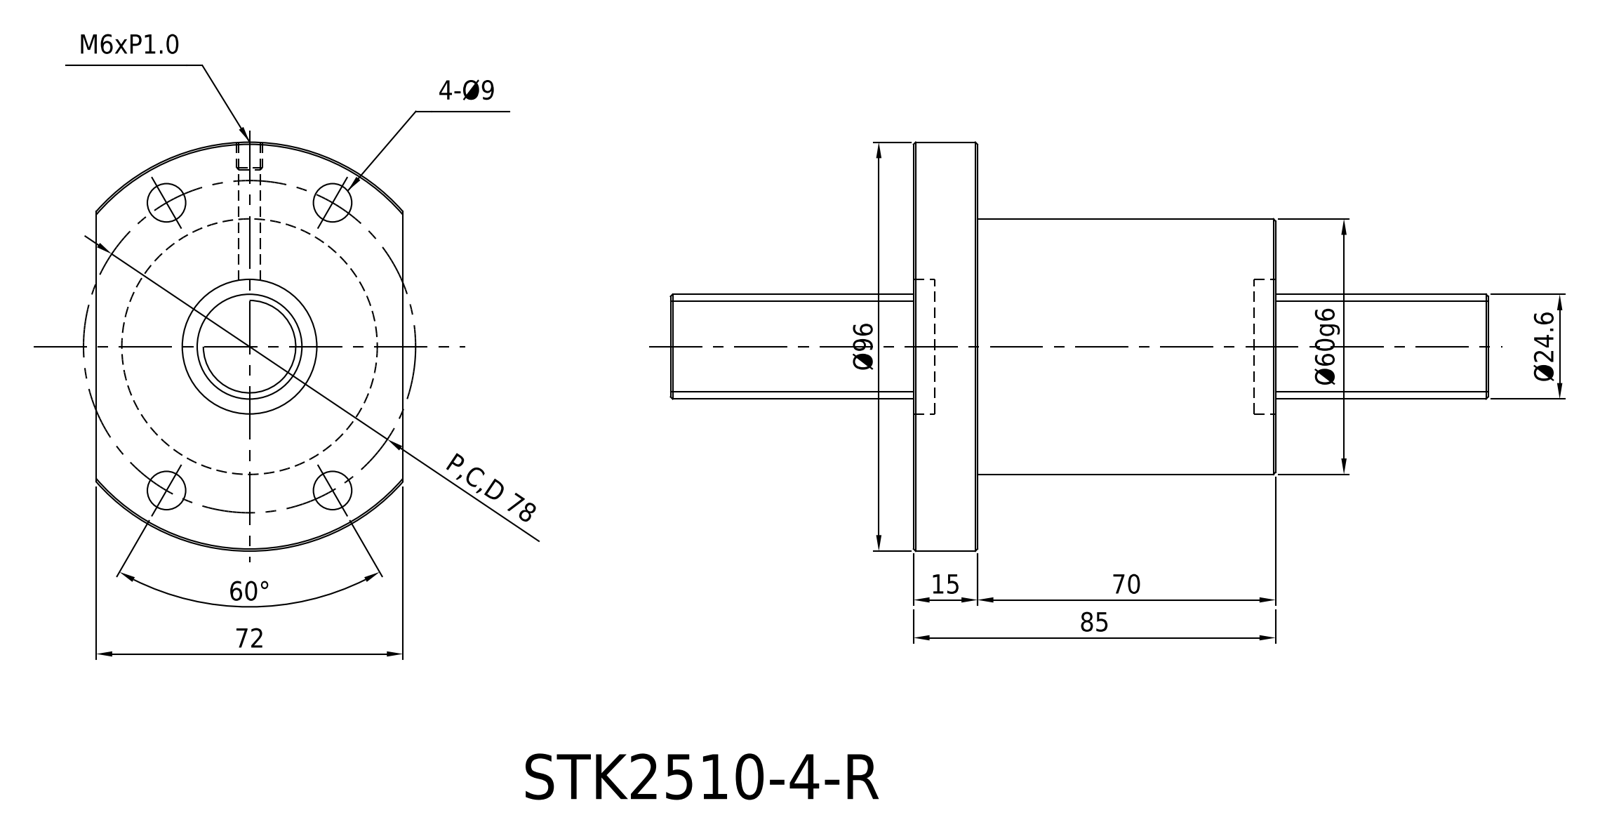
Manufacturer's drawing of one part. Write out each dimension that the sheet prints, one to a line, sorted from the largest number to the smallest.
Ø96
85
P,C,D 78
72
70
Ø60g6
60°
Ø24.6
15
